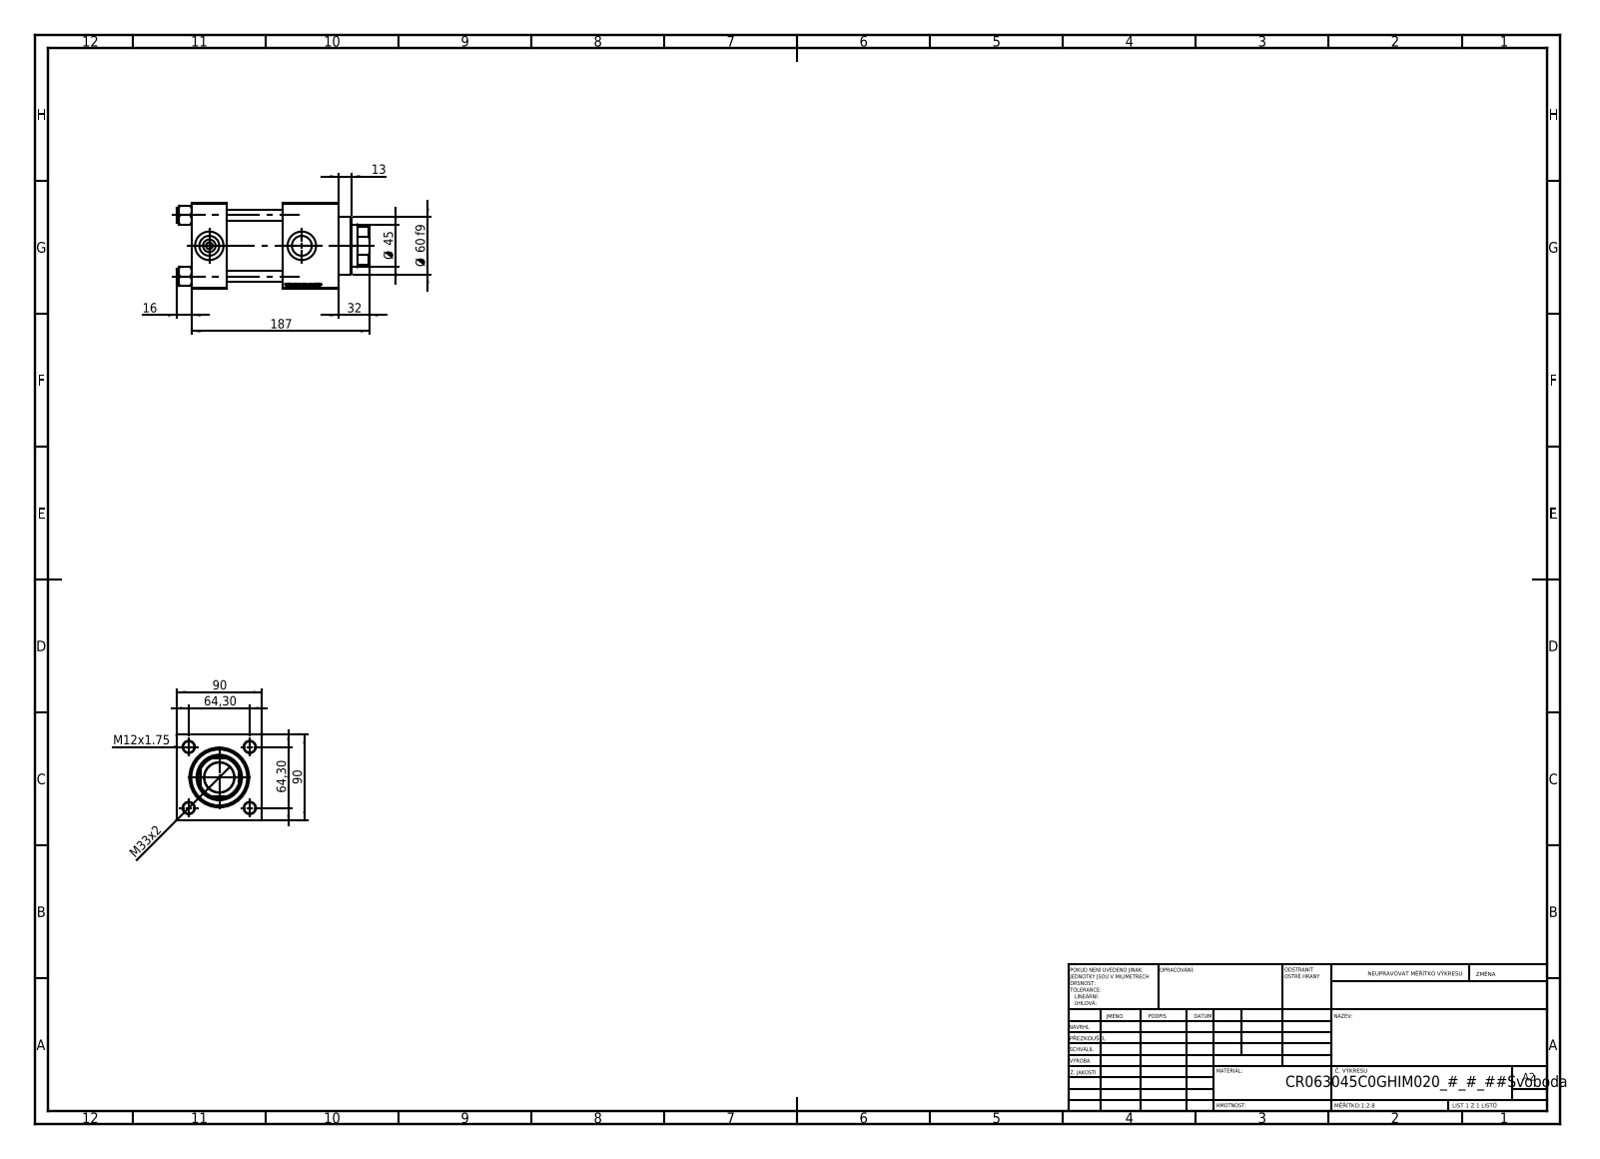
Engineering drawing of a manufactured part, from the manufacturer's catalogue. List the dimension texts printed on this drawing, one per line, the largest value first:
187
90
90
64,30
64,30
Ø 60 f9
Ø 45
M33x2
32
16
13
M12x1.75
